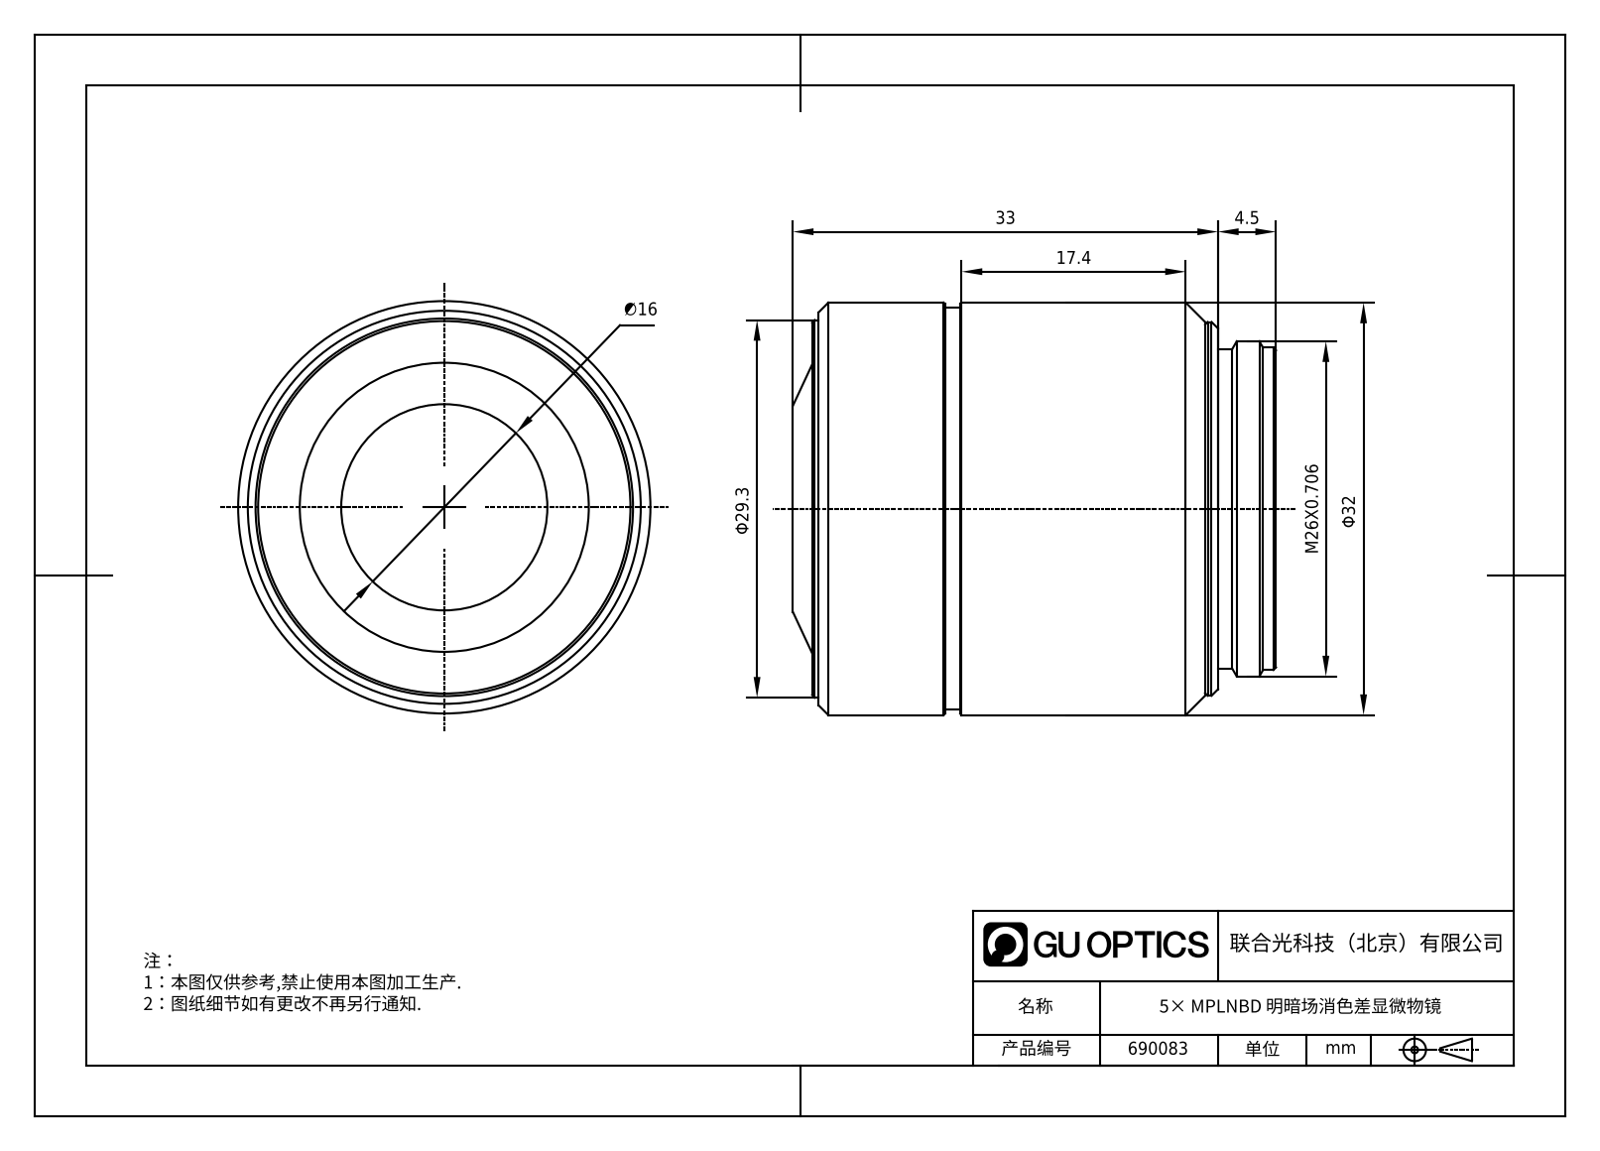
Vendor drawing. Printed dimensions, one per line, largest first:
33
Φ32
Φ29.3
M26X0.706
17.4
∅16
4.5
